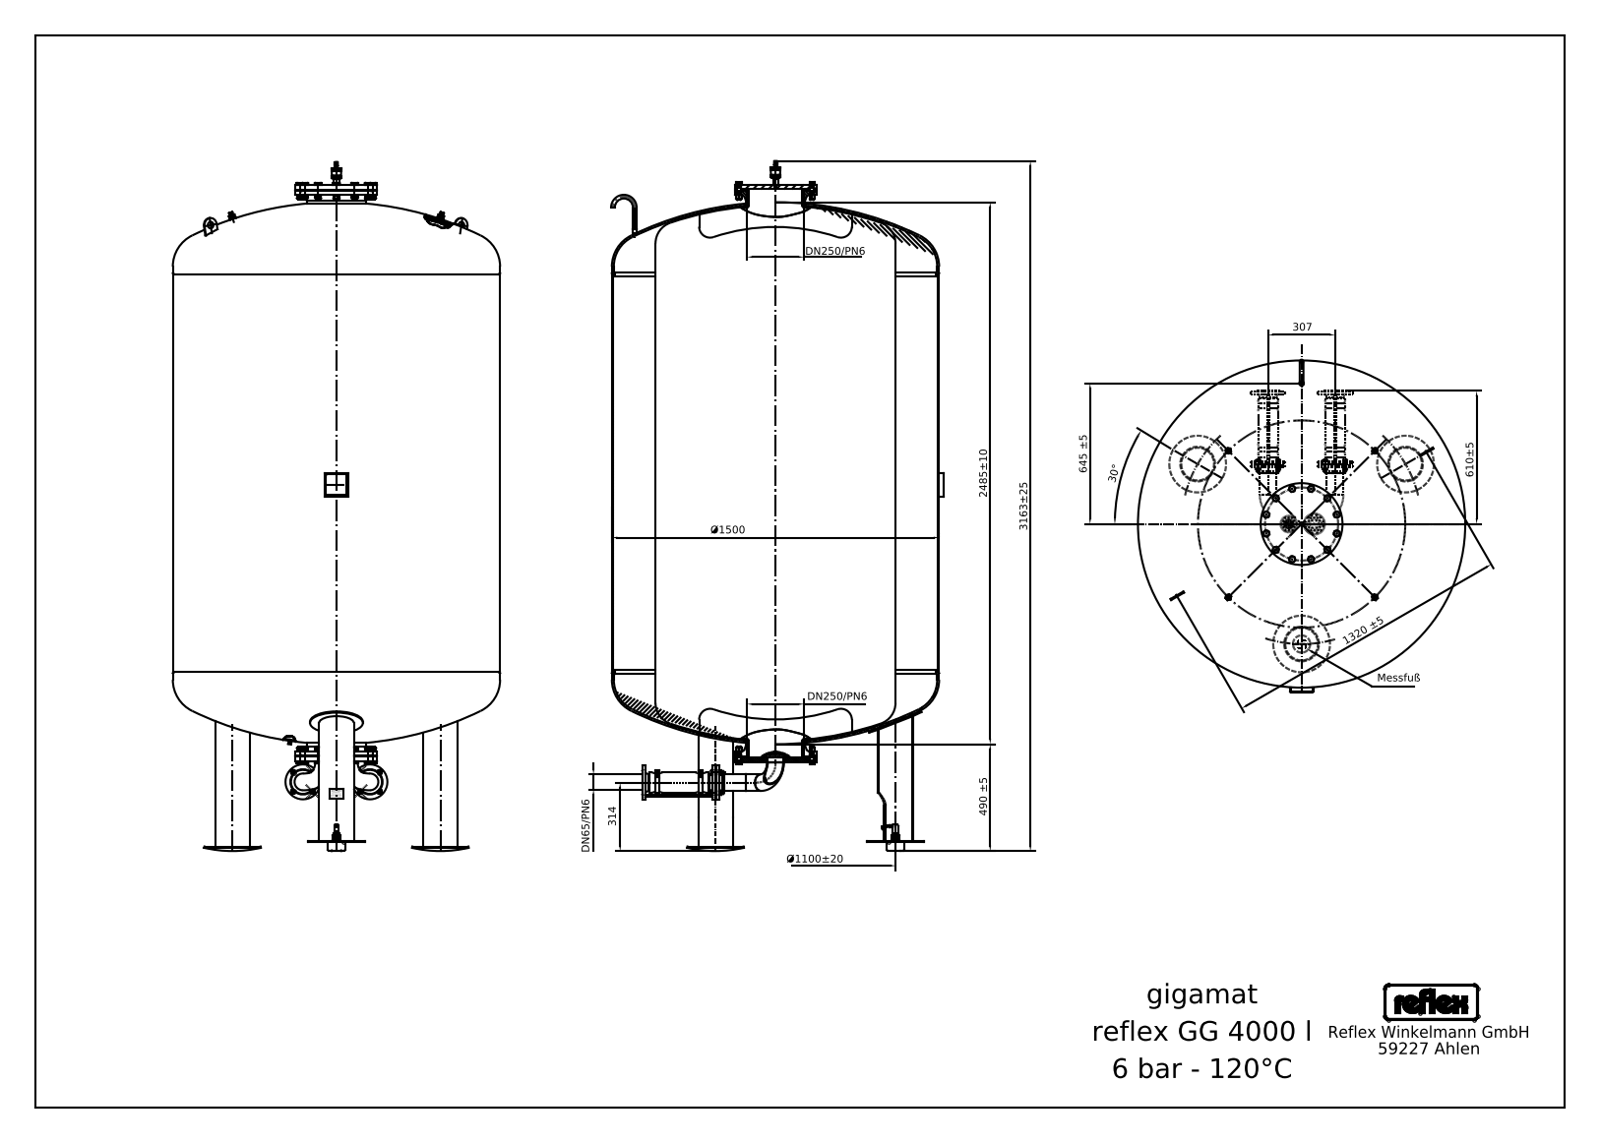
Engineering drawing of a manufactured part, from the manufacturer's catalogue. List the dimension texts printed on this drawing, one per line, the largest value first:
3163±25
2485±10
Ø1500
1320 ±5
Ø1100±20
645 ±5
610±5
490 ±5
314
307
DN250/PN6
DN250/PN6
DN65/PN6
30°
